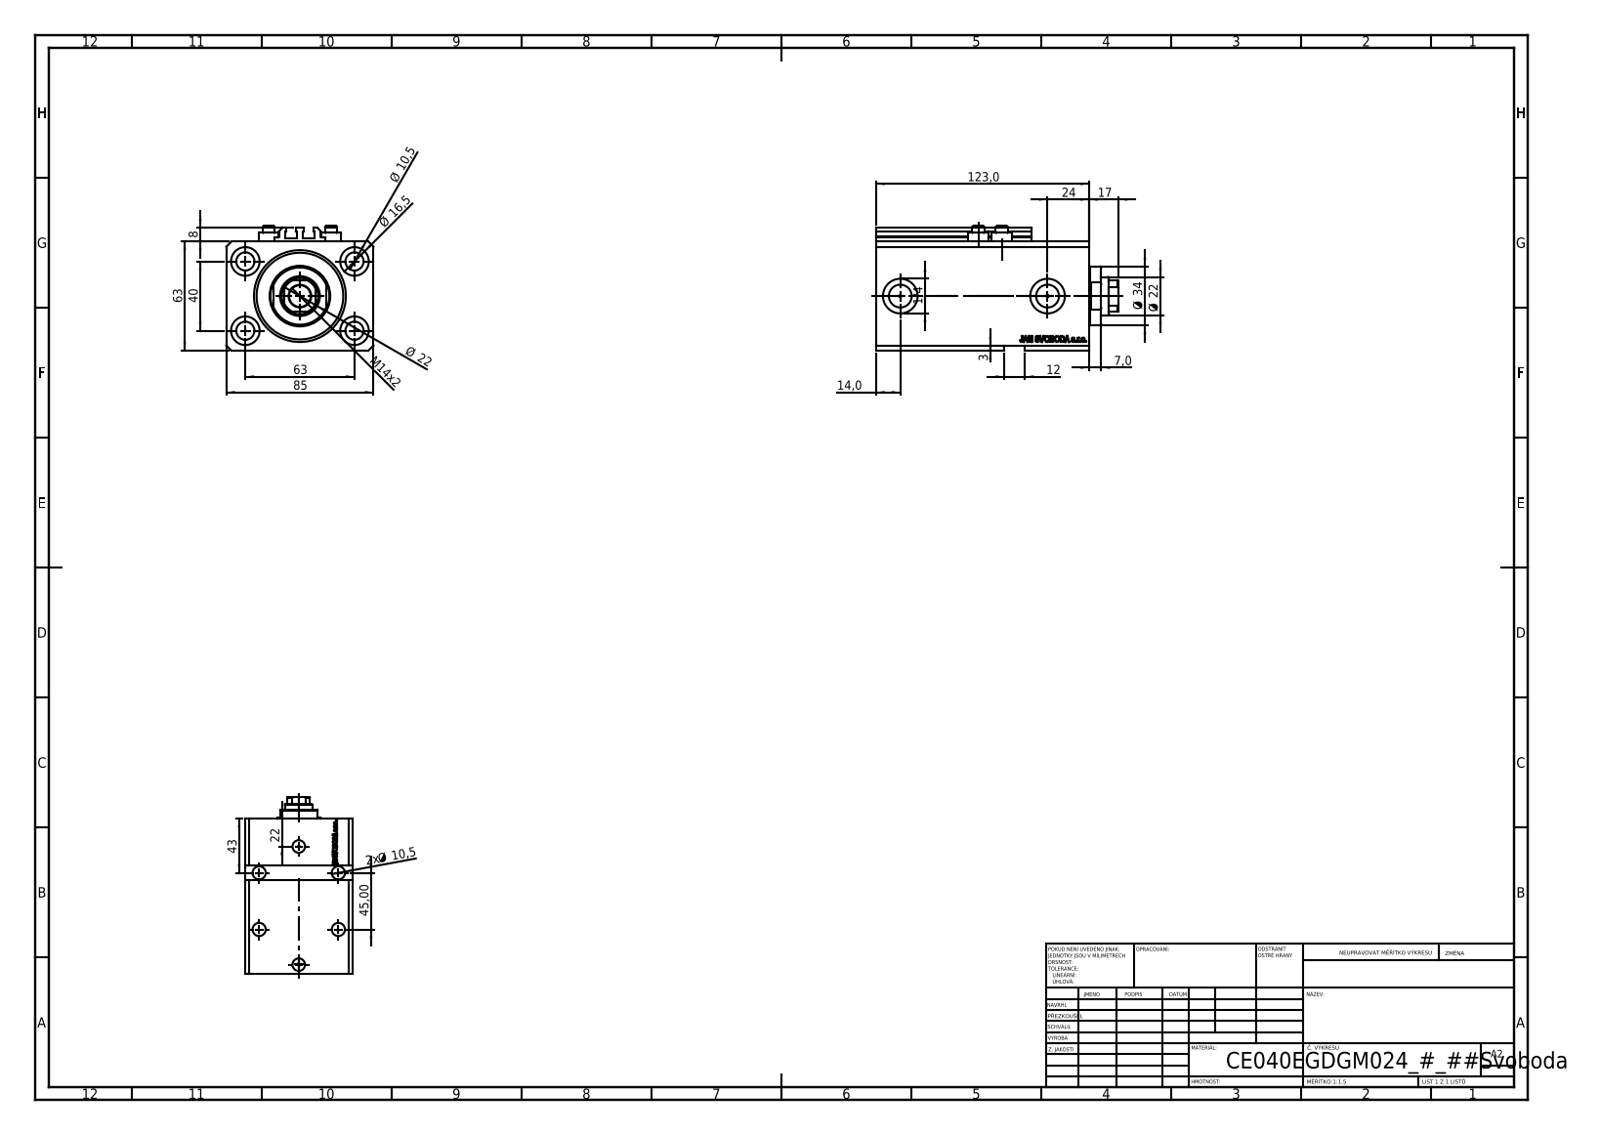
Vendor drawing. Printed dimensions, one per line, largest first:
123,0
85
63
63
45,00
43
40
Ø 34
24
Ø 22
Ø 22
22
17
Ø 16,5
M14x2
14,0
12
Ø 10,5
2x Ø 10,5
8
7,0
3
1/4
